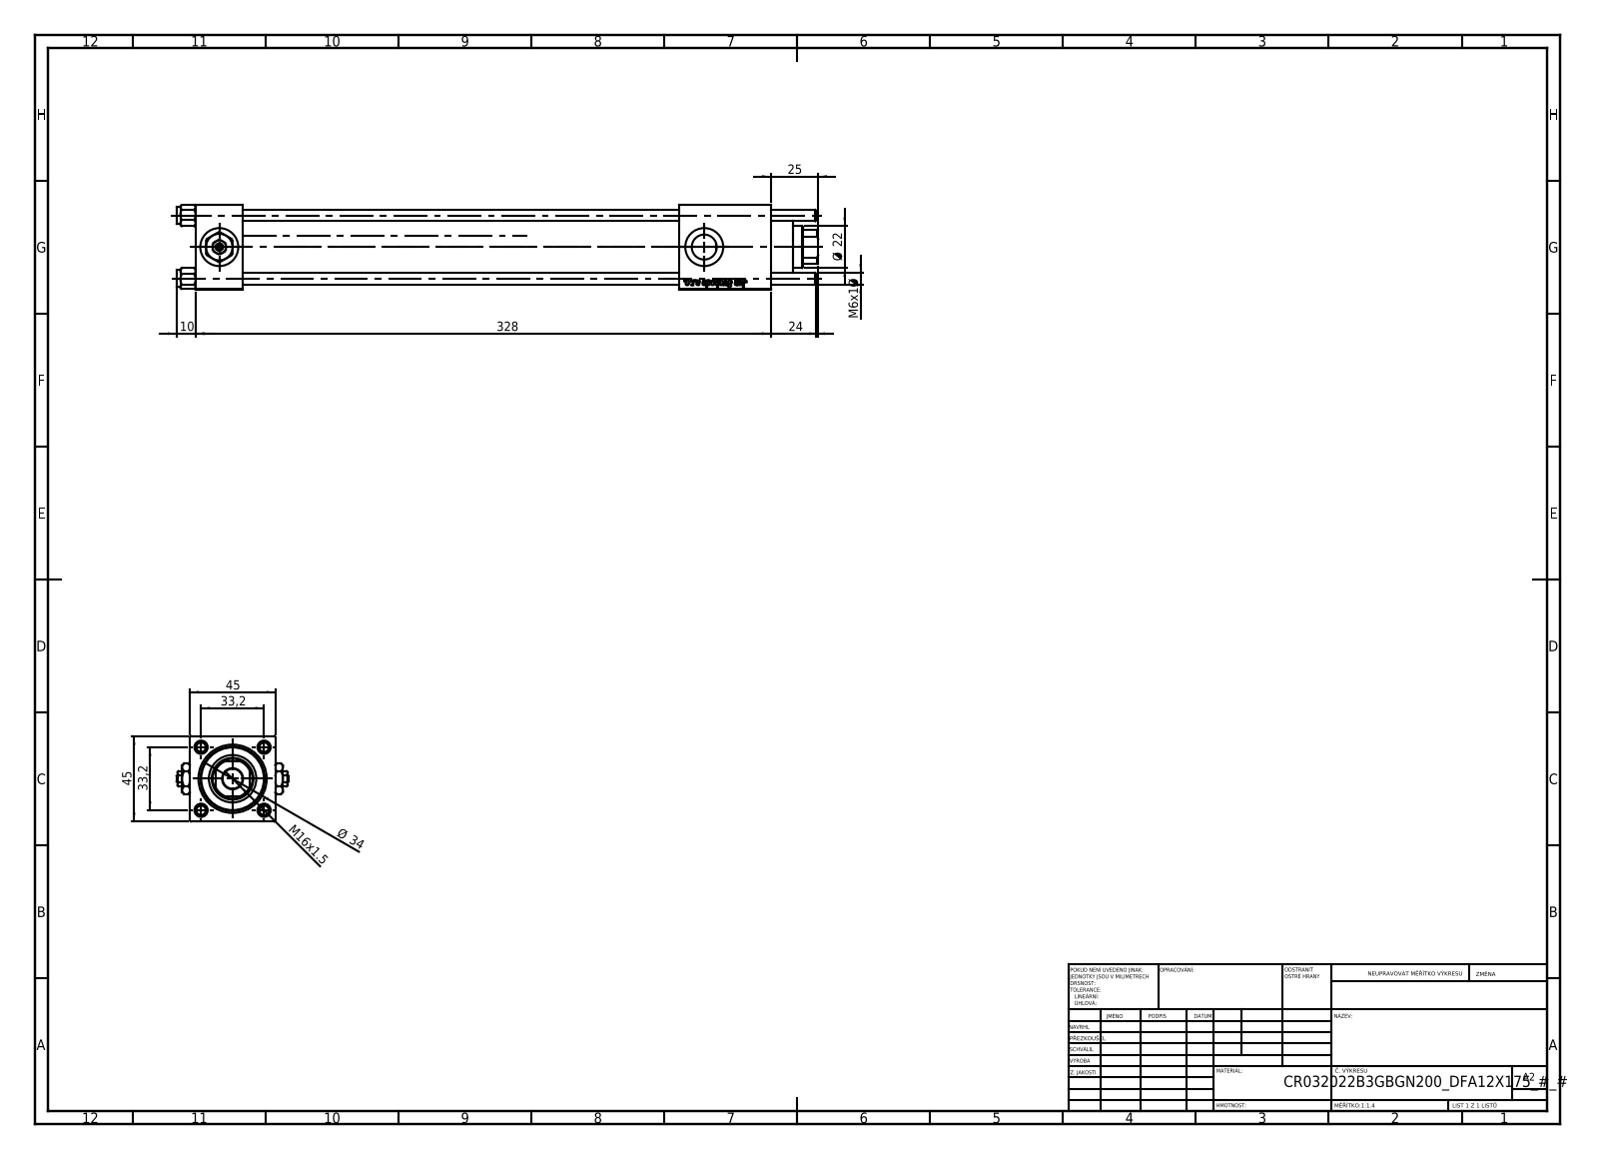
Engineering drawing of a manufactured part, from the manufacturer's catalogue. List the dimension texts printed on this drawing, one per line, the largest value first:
328
45
45
Ø 34
33,2
33,2
25
24
Ø 22
M16x1.5
10
M6x1 Ø
